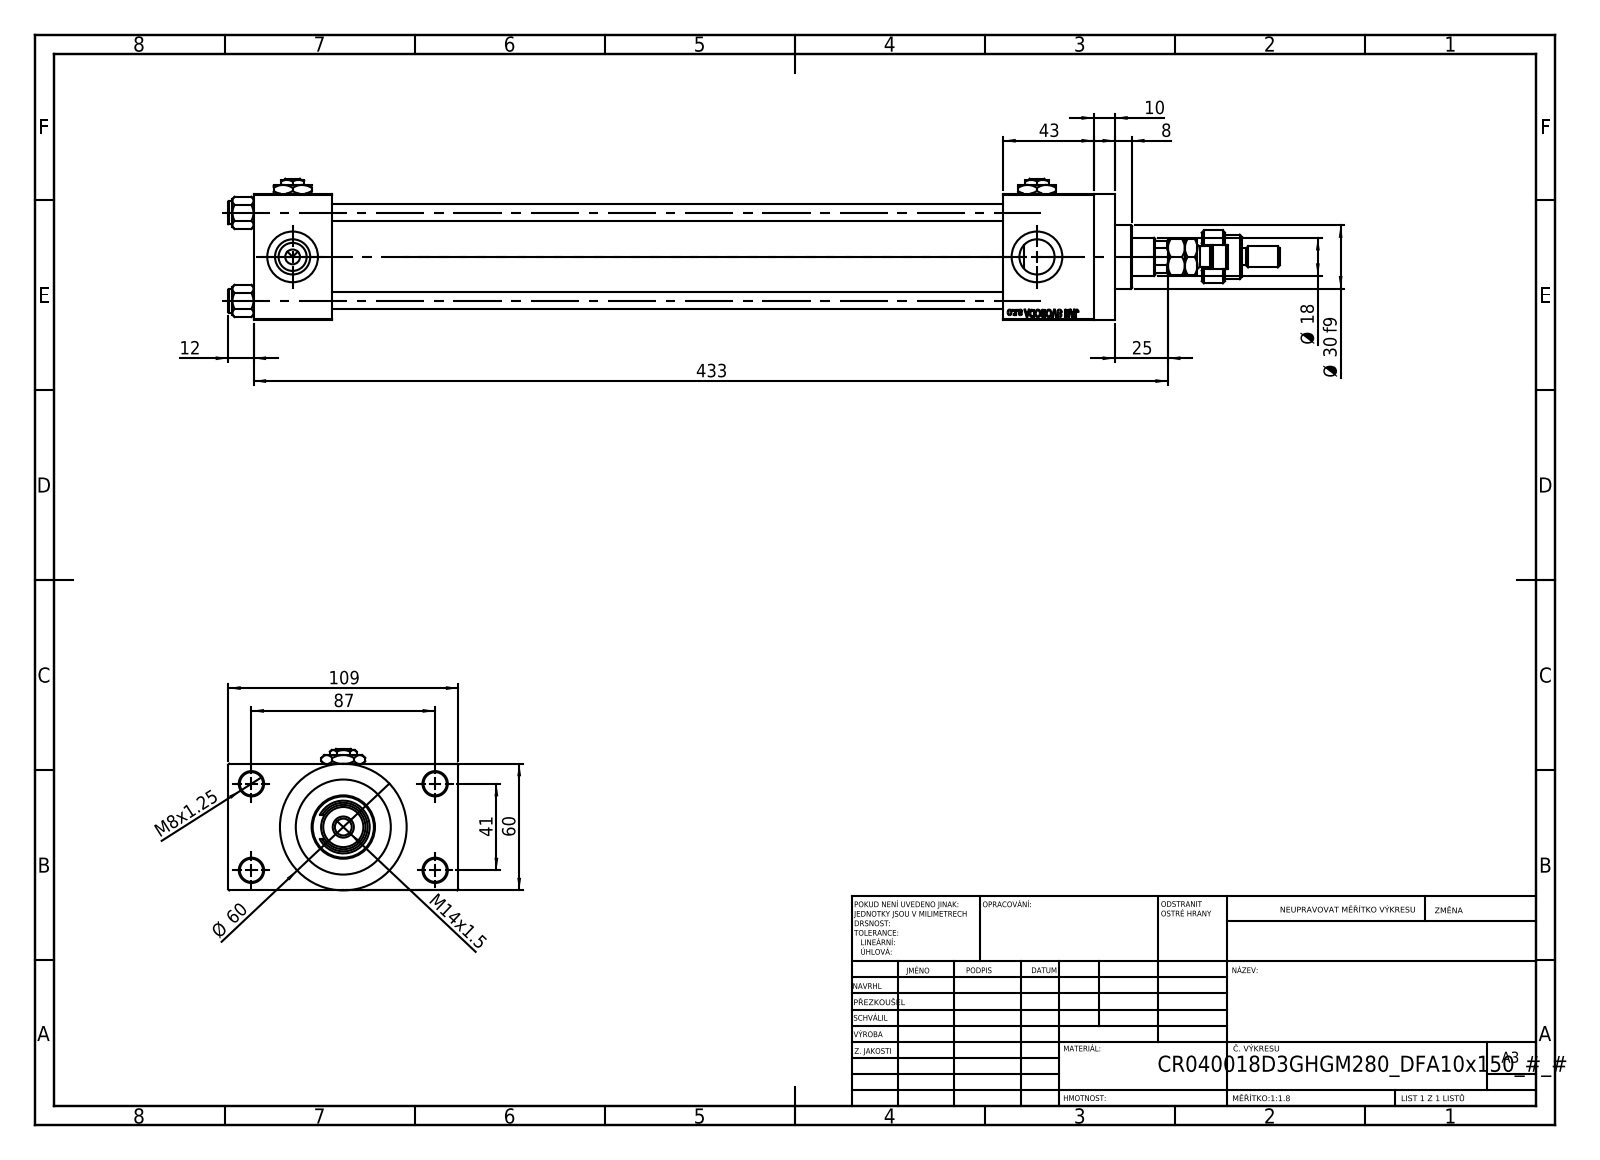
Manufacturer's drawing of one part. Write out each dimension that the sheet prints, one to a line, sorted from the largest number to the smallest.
433
109
87
Ø 60
60
43
41
Ø 30 f9
25
Ø 18
M14x1.5
12
10
8
M8x1.25
